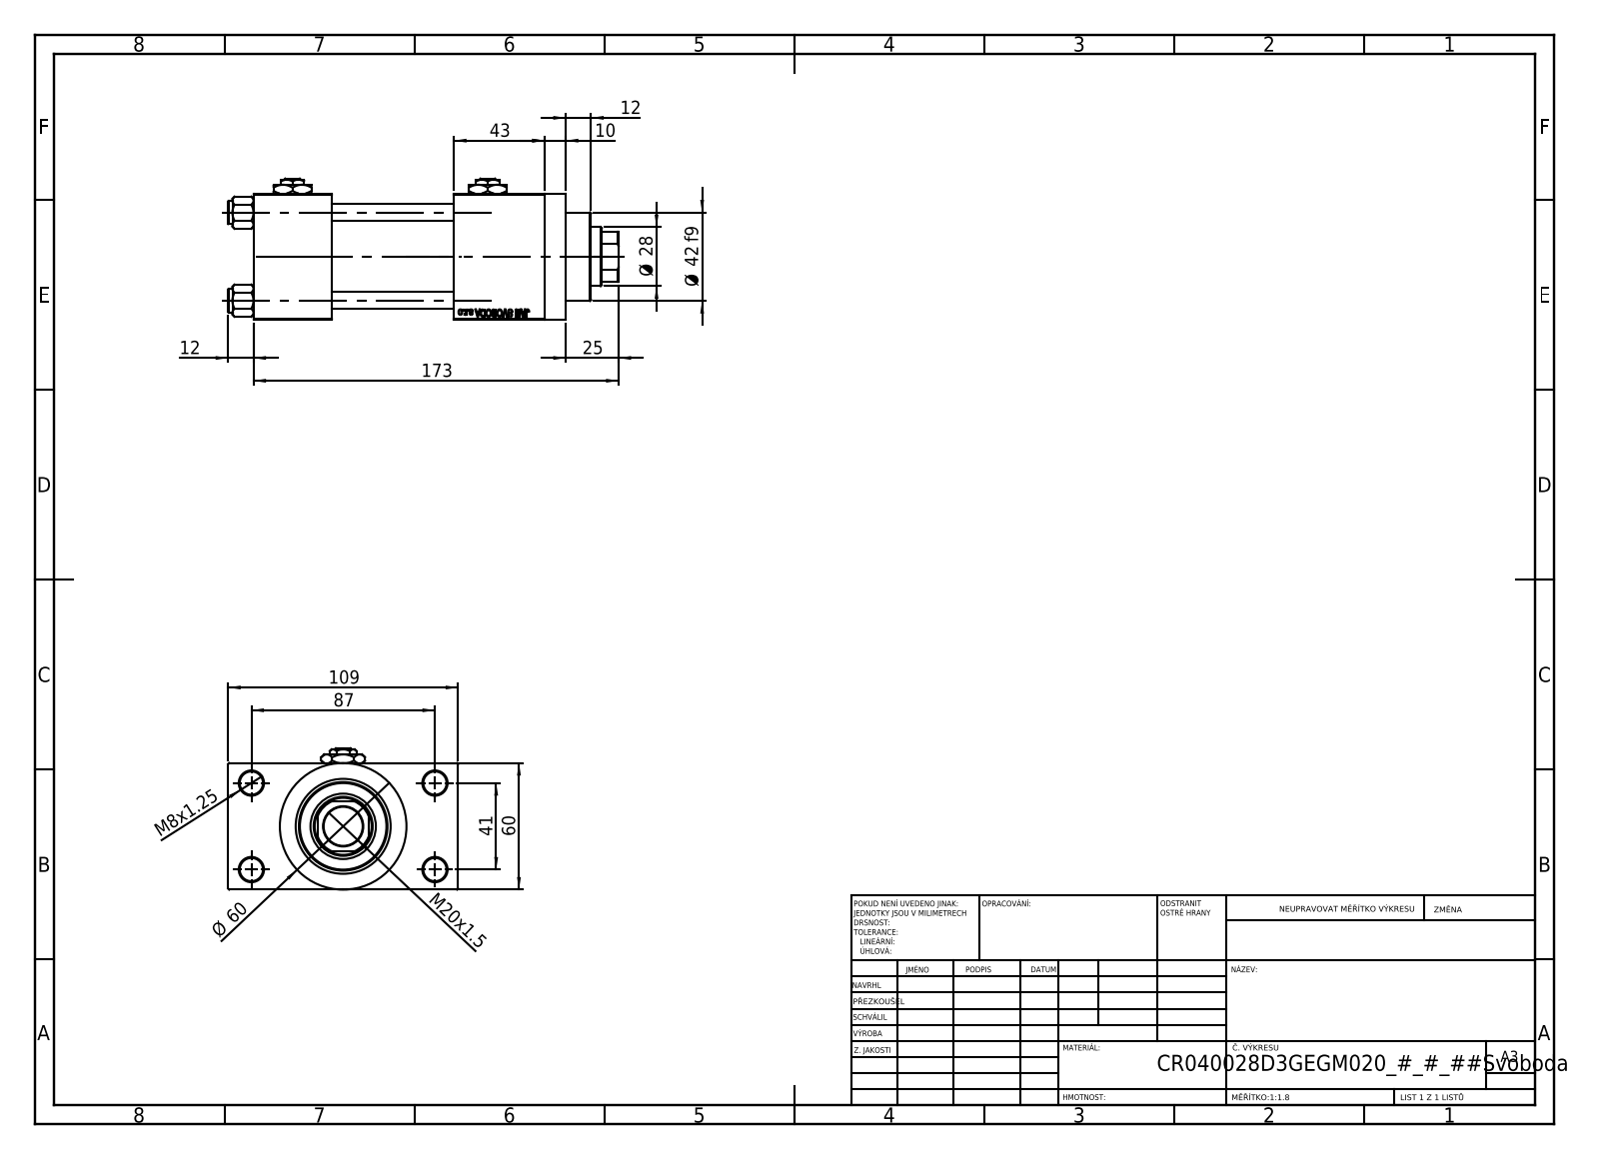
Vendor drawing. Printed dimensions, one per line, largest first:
173
109
87
Ø 60
60
43
Ø 42 f9
41
Ø 28
25
M20x1.5
12
12
10
M8x1.25
